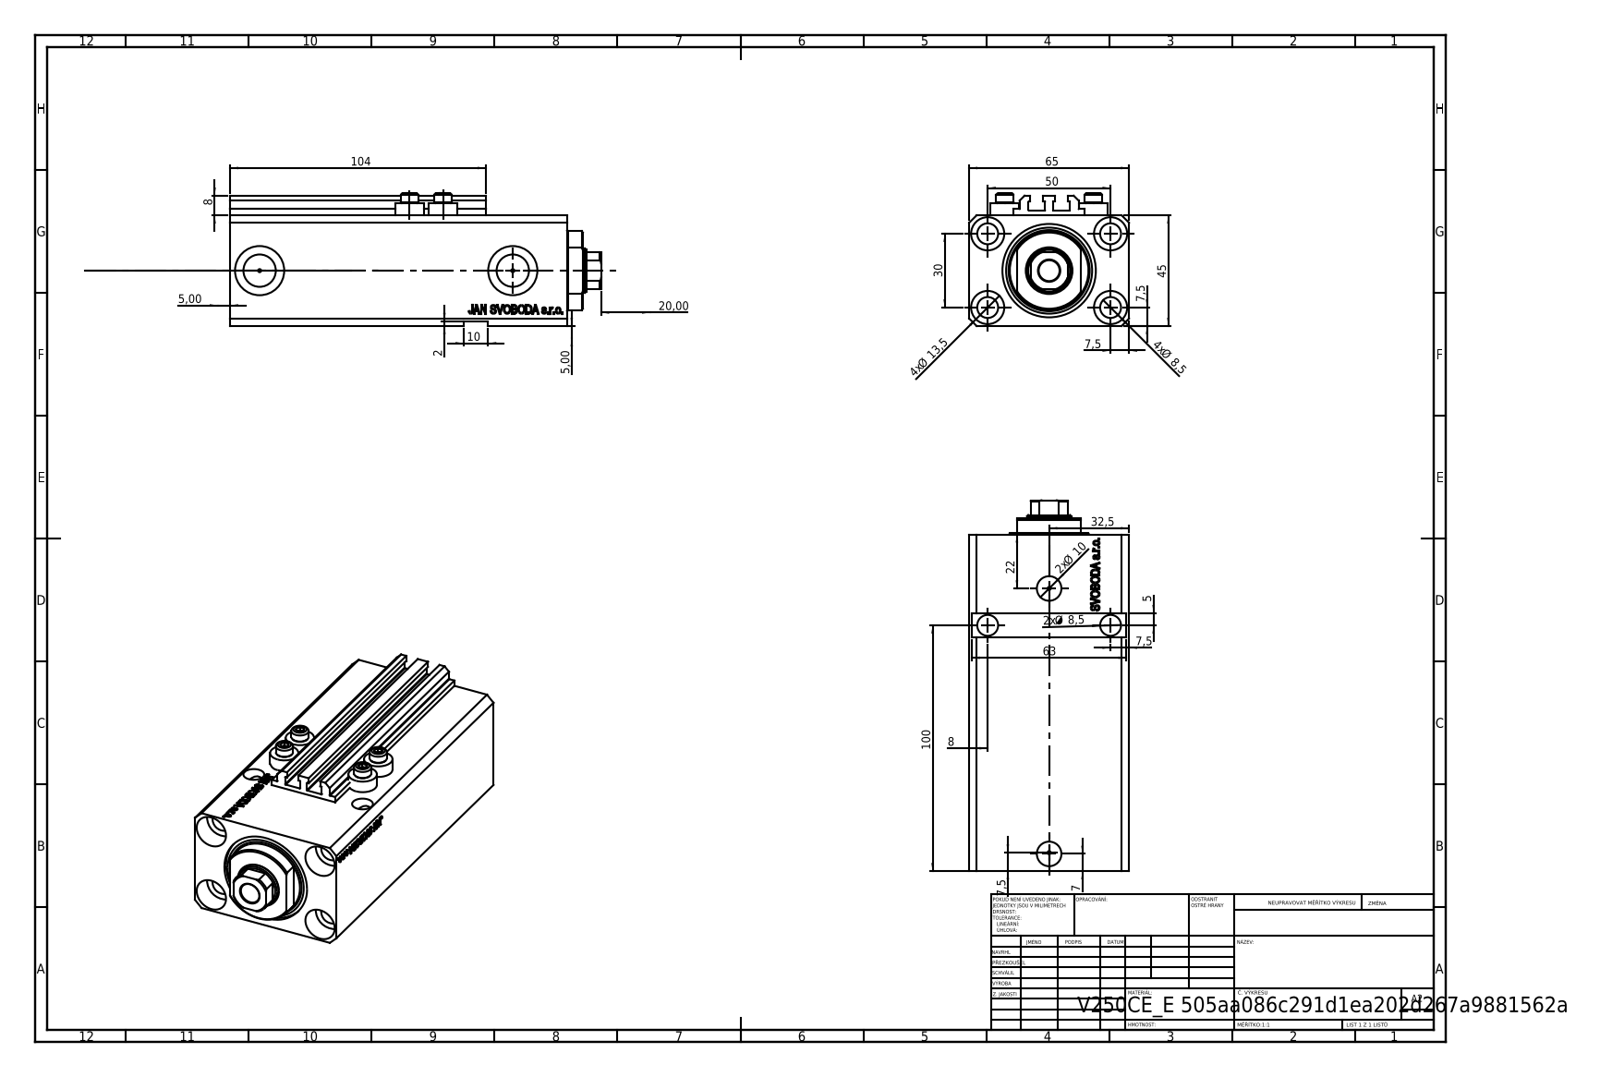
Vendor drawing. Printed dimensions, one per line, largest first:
104
100
65
63
50
45
32,5
30
22
20,00
4x Ø 13,5
10
2x Ø 10
4x Ø 8,5
2x Ø 8,5
8
8
7,5
7,5
7,5
7,5
7
5,00
5,00
5
2
